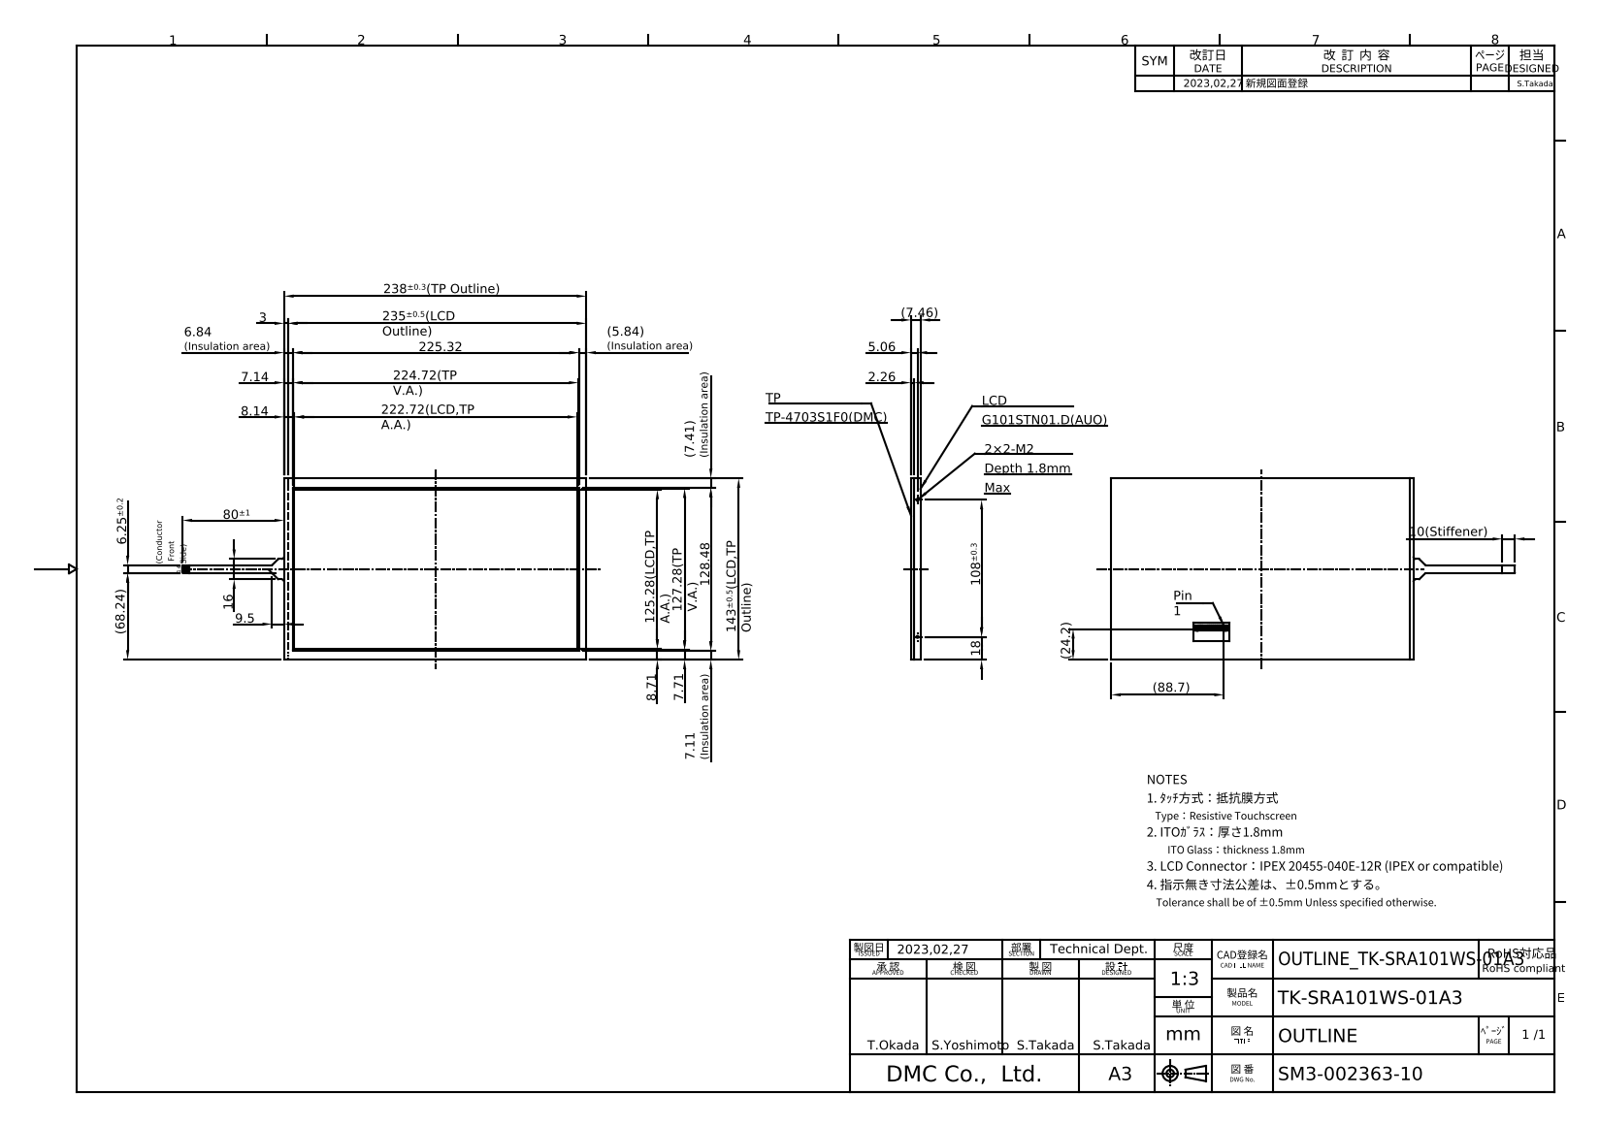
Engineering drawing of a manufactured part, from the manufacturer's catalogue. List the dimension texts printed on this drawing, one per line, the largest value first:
238±0.3(TP Outline)
235±0.5(LCD Outline)
225.32
224.72(TP V.A.)
222.72(LCD,TP A.A.)
143±0.5(LCD,TP Outline)
128.48
127.28(TP V.A.)
125.28(LCD,TP A.A.)
108±0.3
(88.7)
80±1
(68.24)
(24.2)
18
16
10(Stiffener)
9.5
8.71
8.14
7.71
(7.46)
(7.41) (Insulation area)
7.14
7.11 (Insulation area)
6.84 (Insulation area)
6.25±0.2
(5.84) (Insulation area)
5.06
3
2.26
